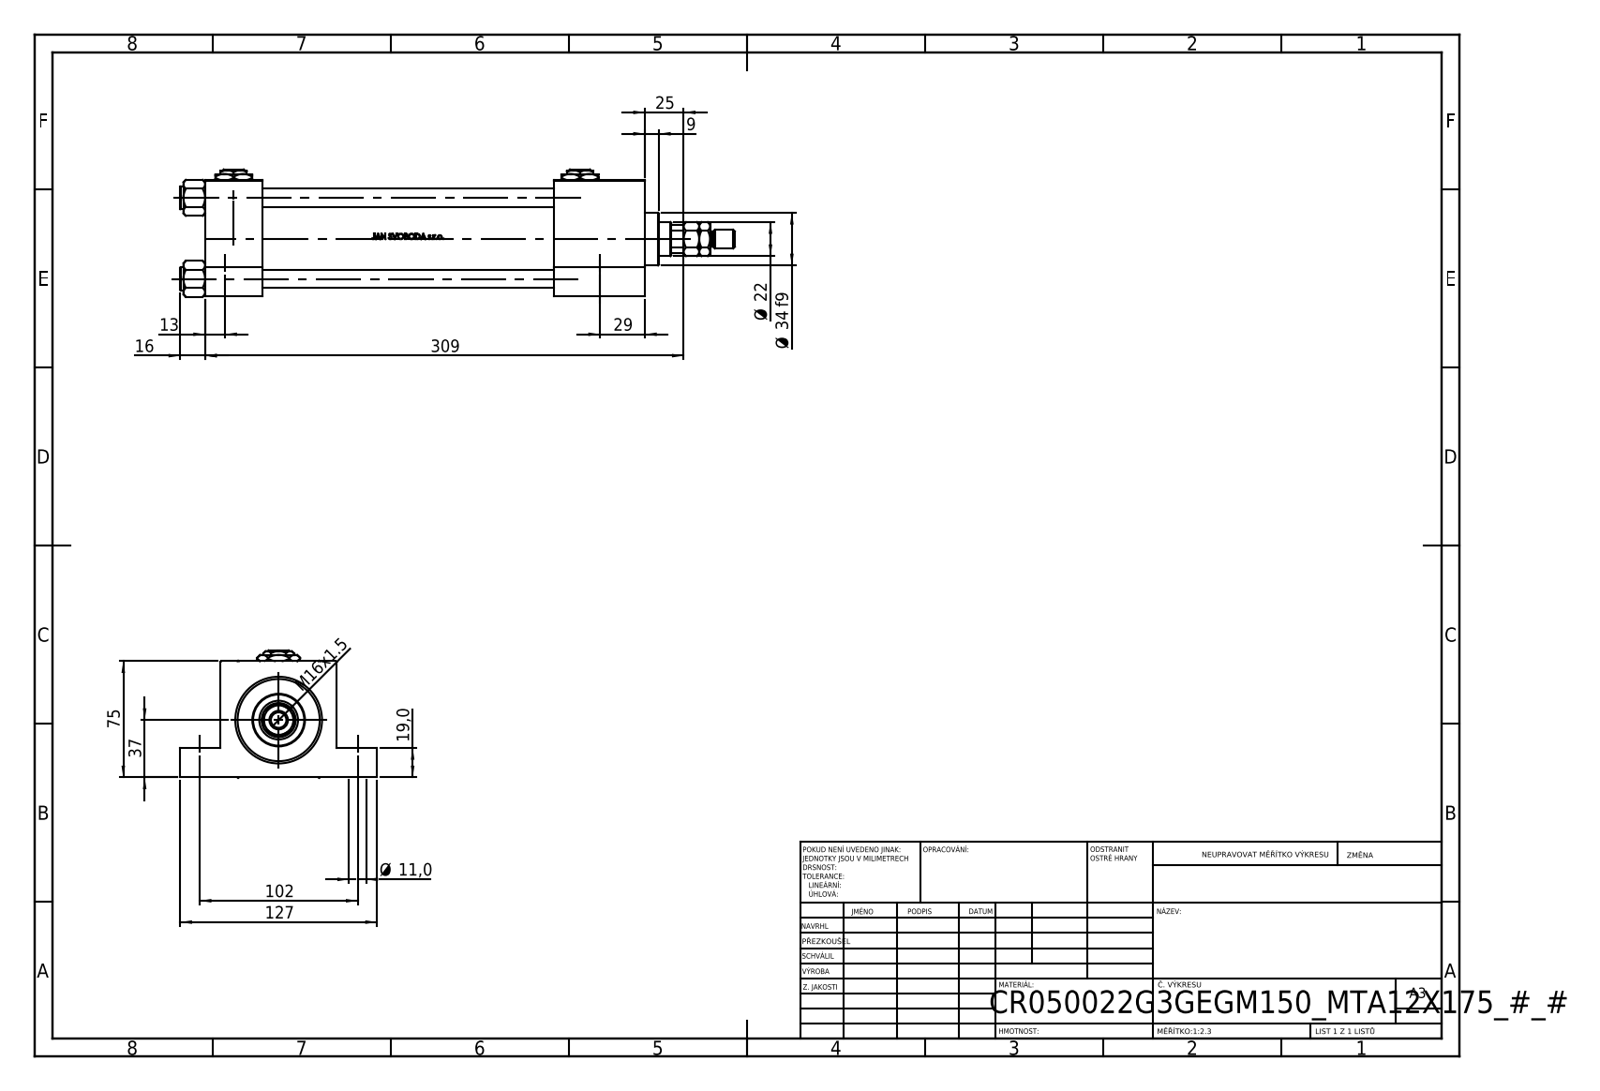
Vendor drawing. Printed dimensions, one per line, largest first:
309
127
102
75
37
Ø 34 f9
29
25
Ø 22
19,0
16
M16x1.5
13
Ø 11,0
9
